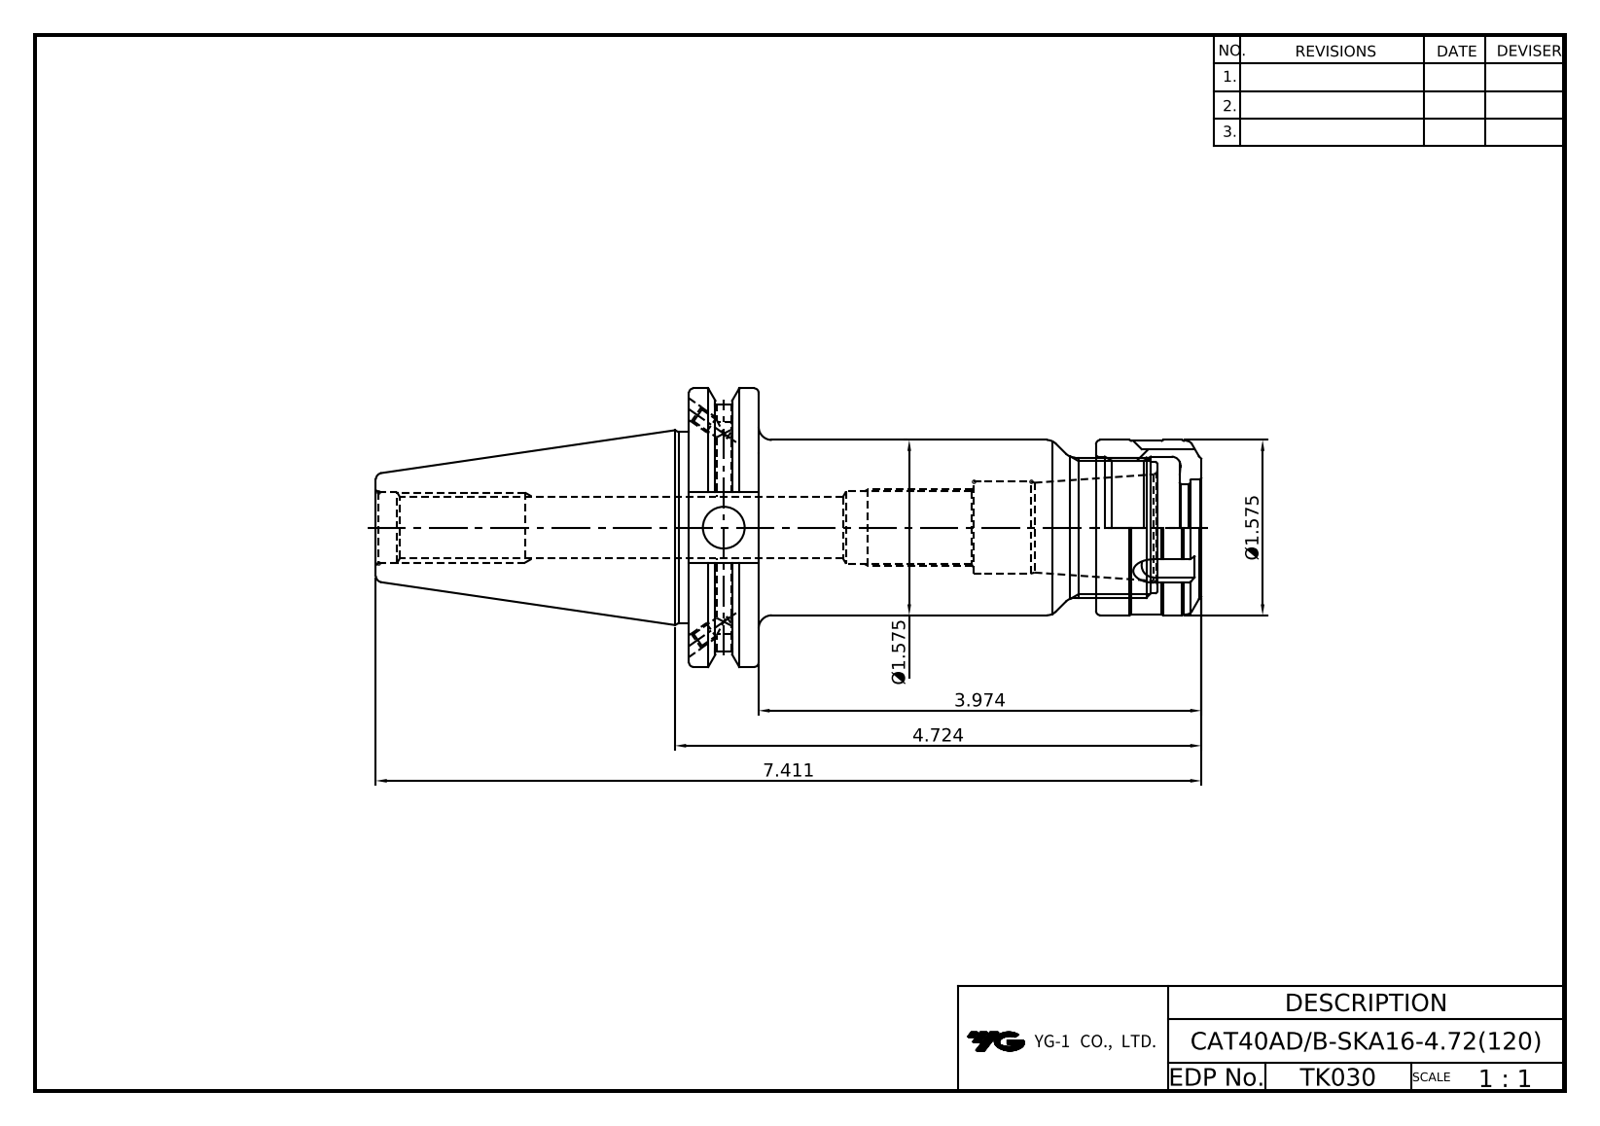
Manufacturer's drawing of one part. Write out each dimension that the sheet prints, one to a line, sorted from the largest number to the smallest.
7.411
4.724
3.974
Ø1.575
Ø1.575
